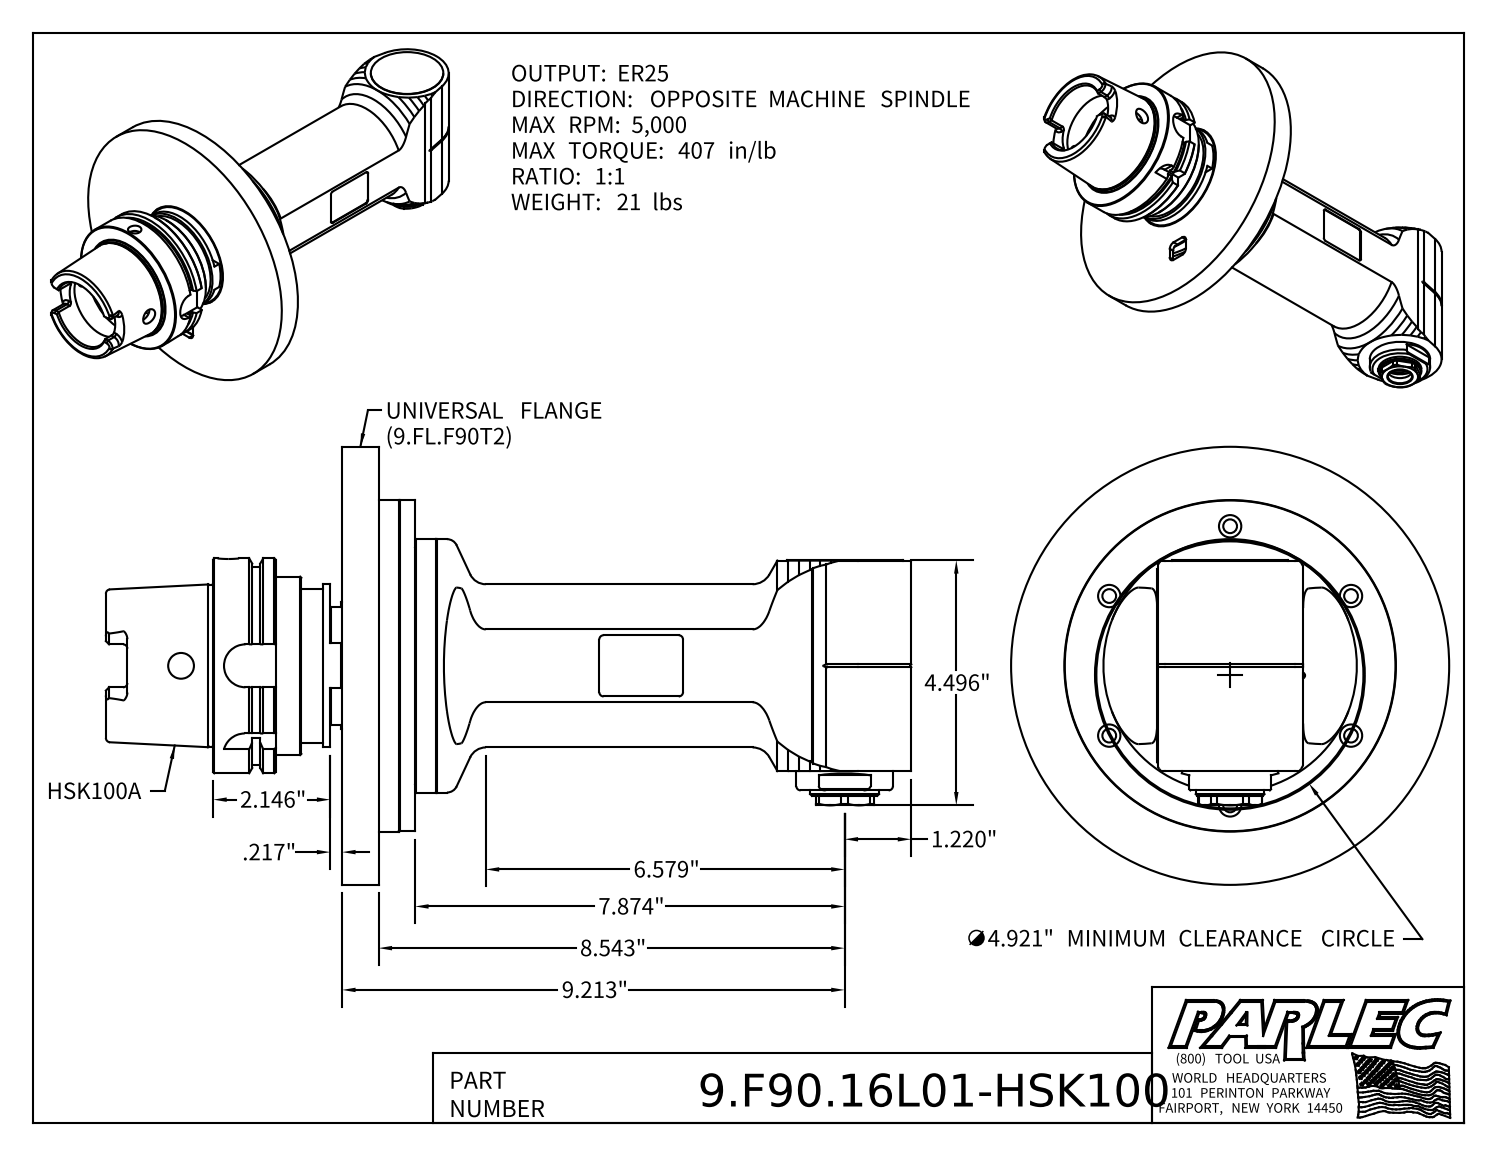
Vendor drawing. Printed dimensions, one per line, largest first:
9.213"
8.543"
7.874"
6.579"
∅4.921" MINIMUM CLEARANCE CIRCLE
4.496"
2.146"
1.220"
.217"
